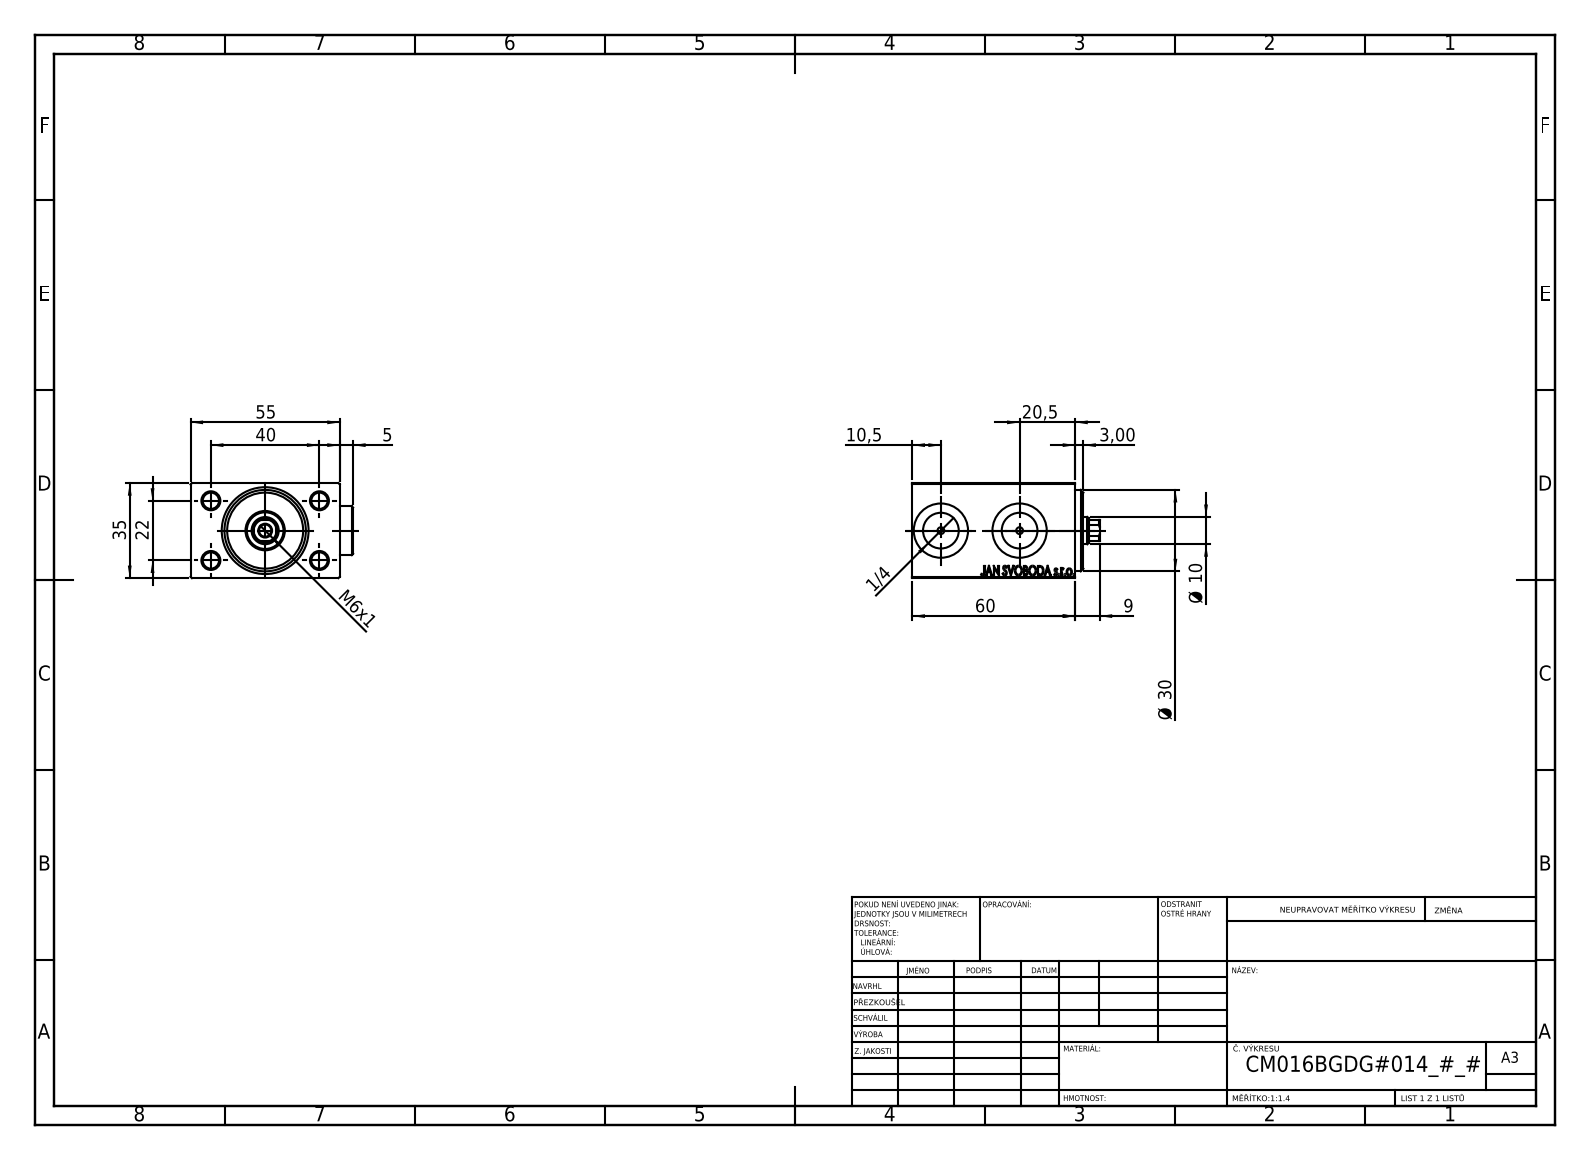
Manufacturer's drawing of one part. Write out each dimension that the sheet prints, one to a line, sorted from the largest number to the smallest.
60
55
40
35
Ø 30
22
20,5
10,5
Ø 10
9
M6x1
5
3,00
1/4
